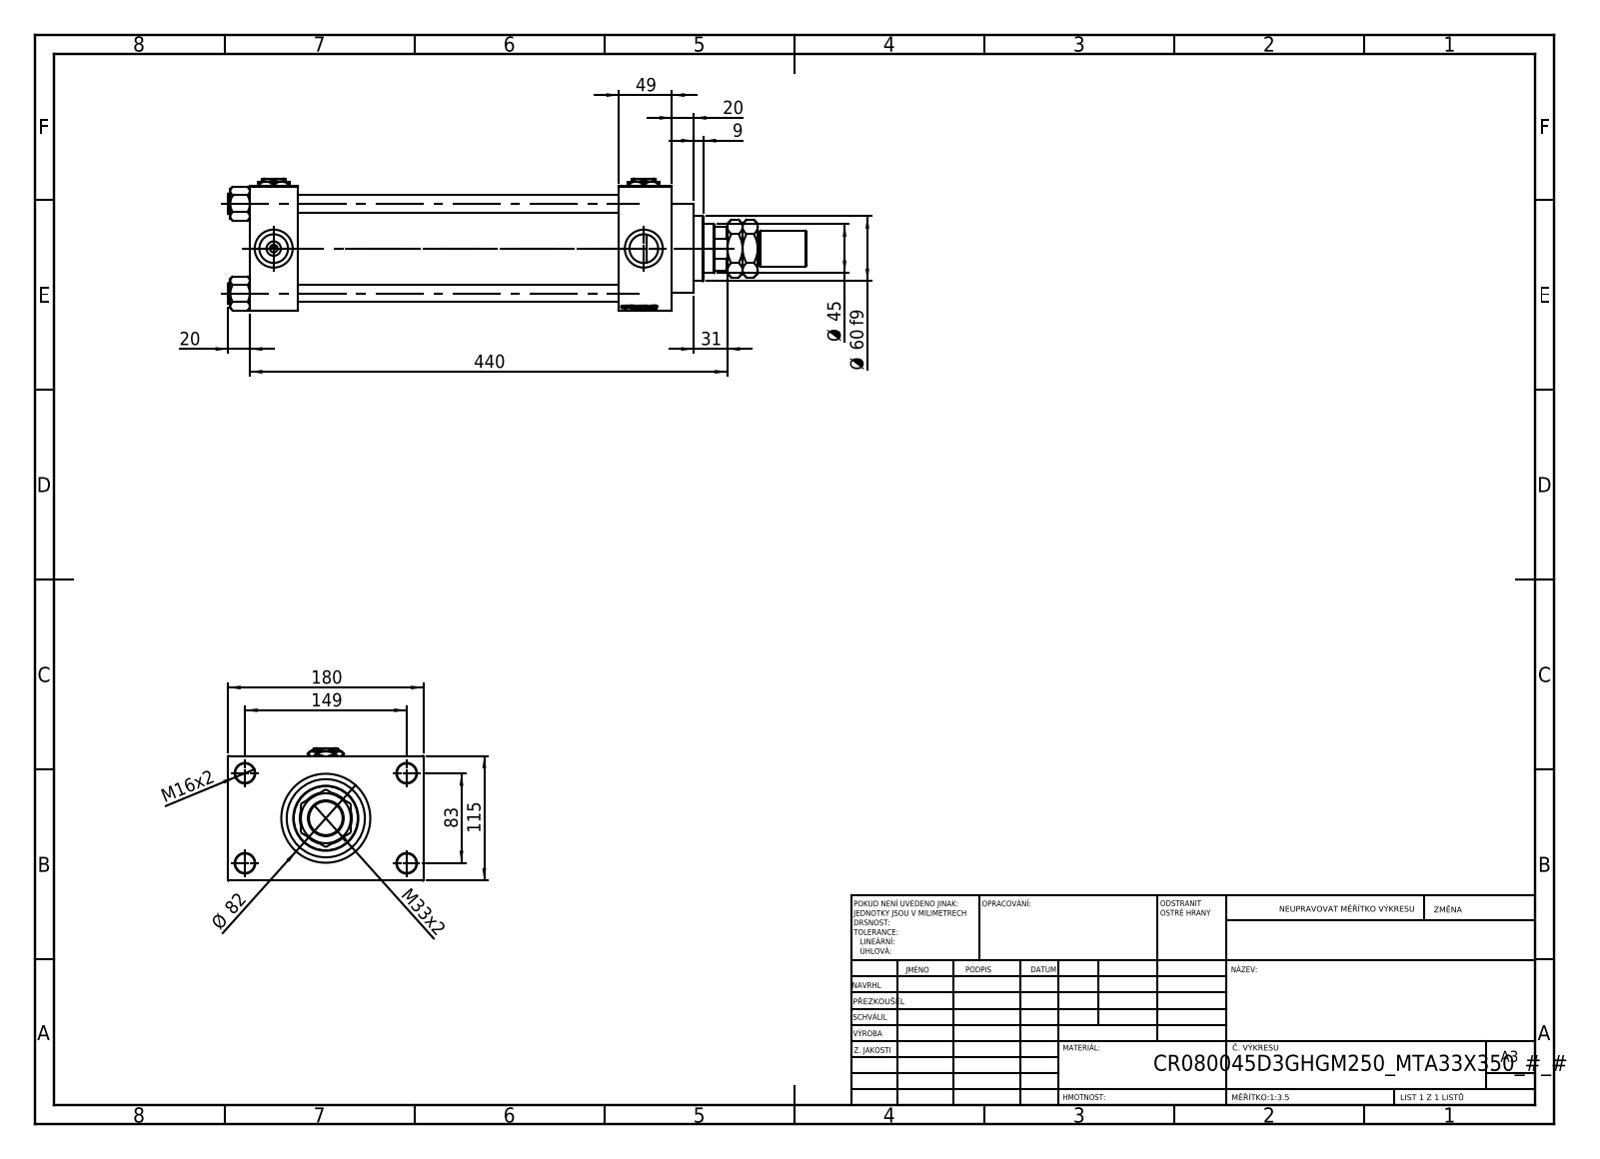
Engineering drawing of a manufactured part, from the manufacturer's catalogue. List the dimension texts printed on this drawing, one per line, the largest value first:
440
180
149
115
83
Ø 82
Ø 60 f9
49
Ø 45
M33x2
31
20
20
M16x2
9
